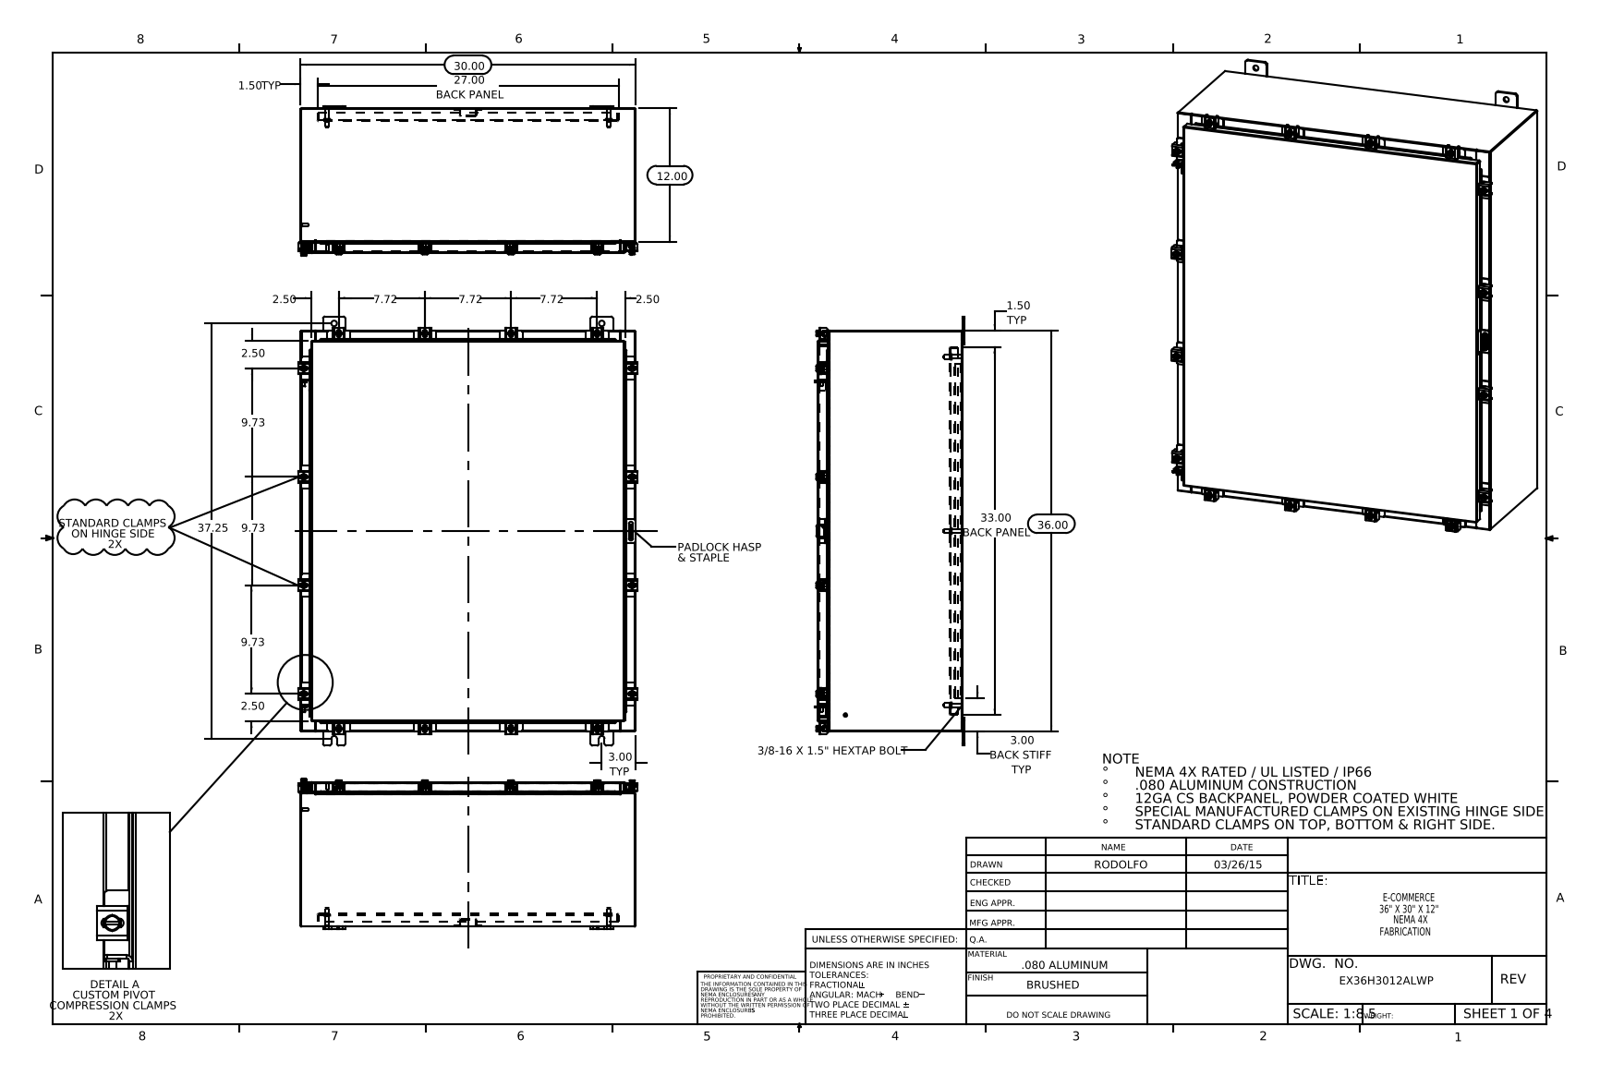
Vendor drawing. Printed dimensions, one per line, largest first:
37.25
36.00
33.00 BACK PANEL
30.00
27.00 BACK PANEL
12.00
9.73
9.73
9.73
7.72
7.72
7.72
3.00 TYP
3.00 BACK STIFF TYP
2.50
2.50
2.50
2.50
1.50 TYP
1.50 TYP
